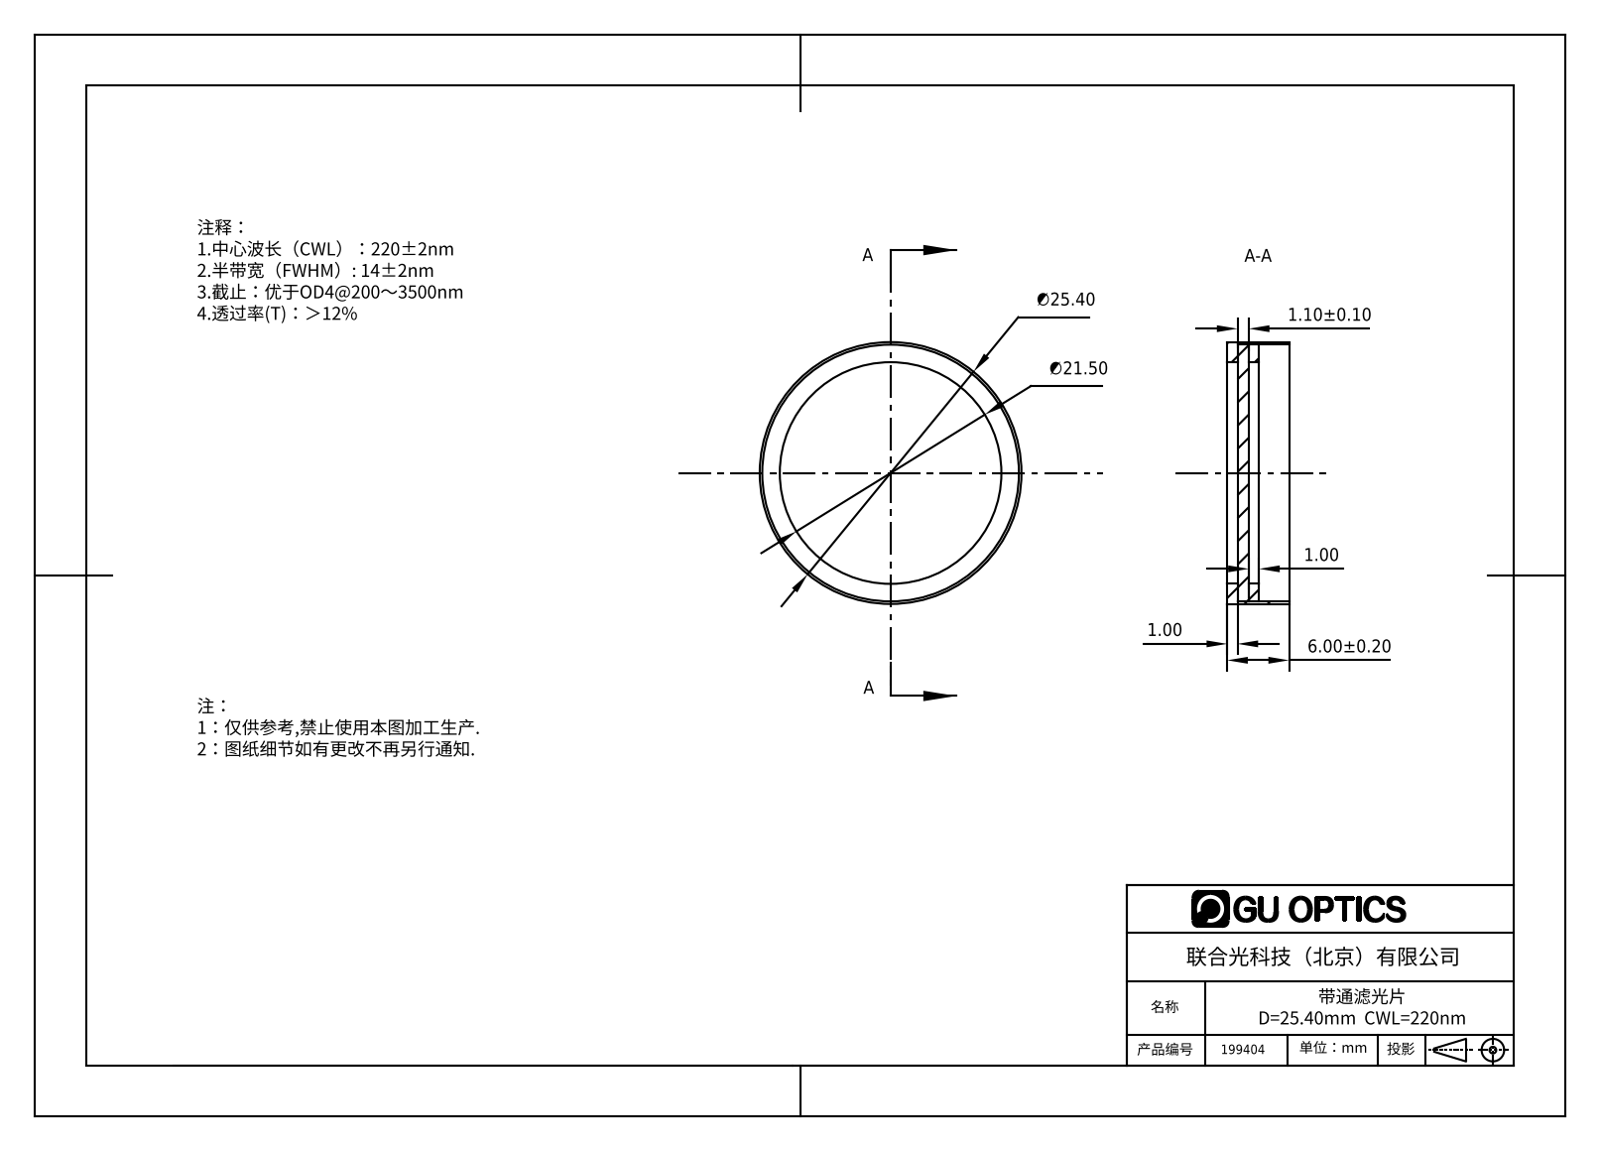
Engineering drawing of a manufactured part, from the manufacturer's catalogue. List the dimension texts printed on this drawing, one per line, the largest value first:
∅25.40
∅21.50
6.00±0.20
1.10±0.10
1.00
1.00
